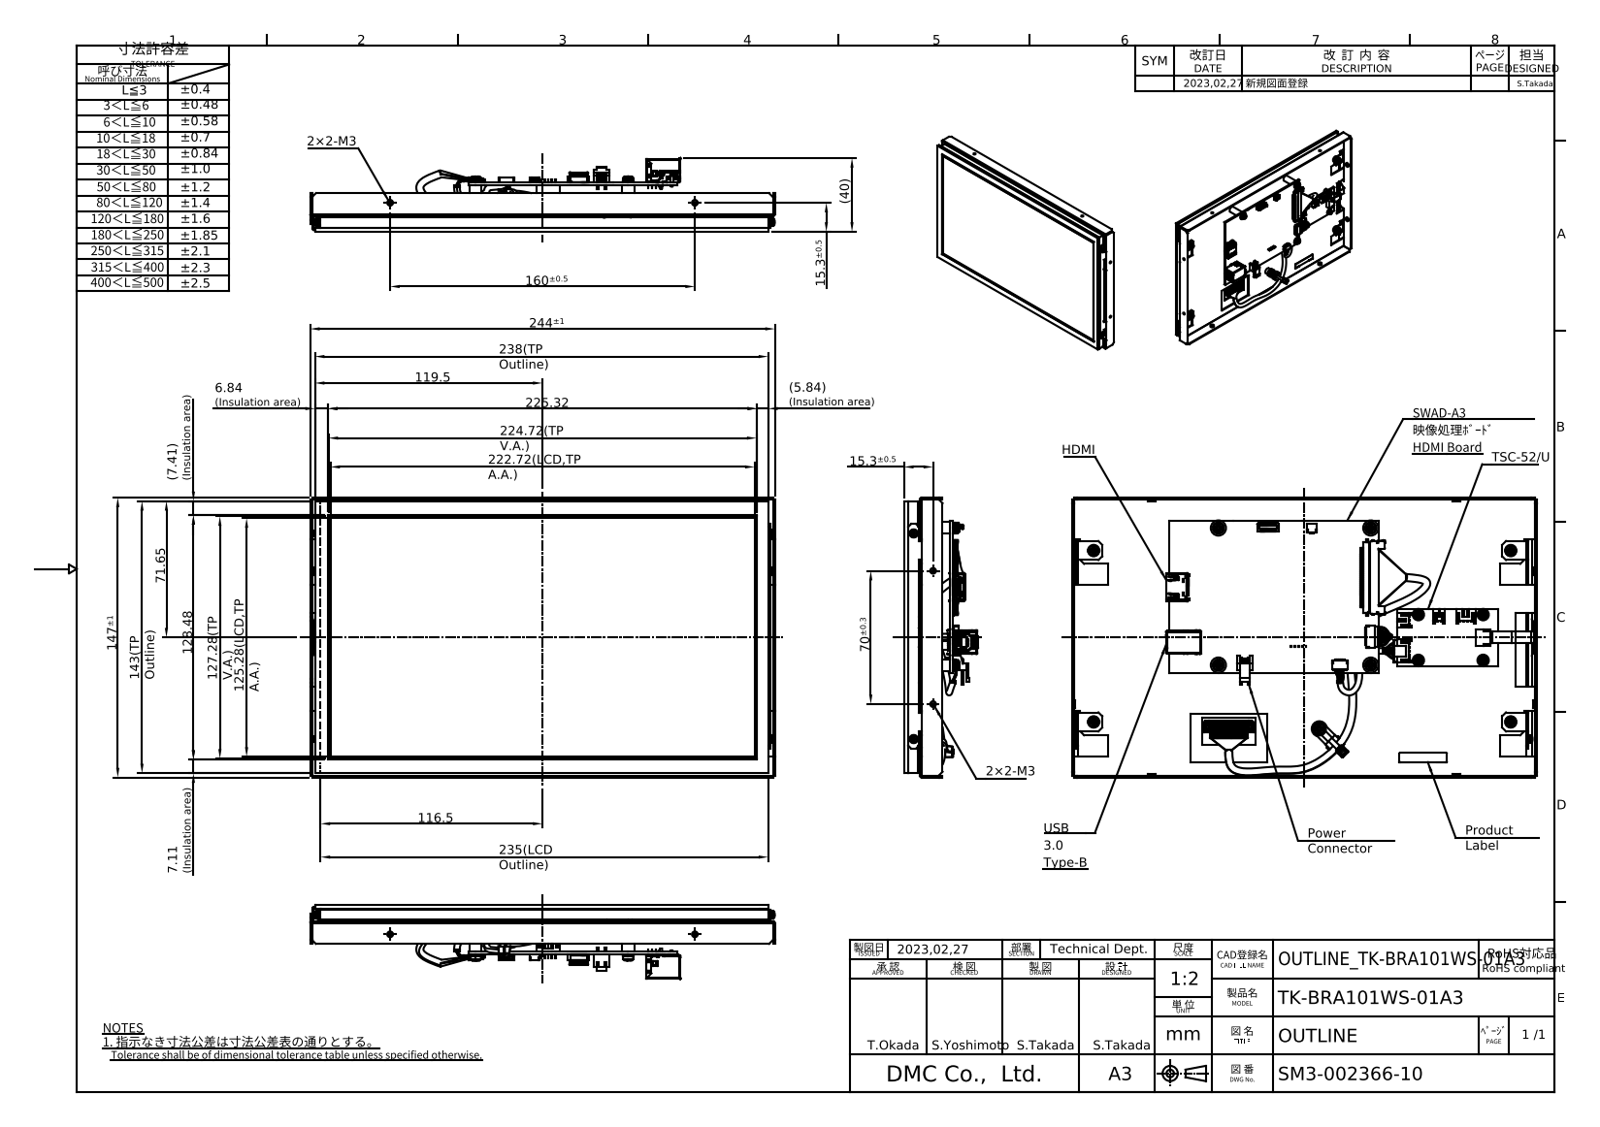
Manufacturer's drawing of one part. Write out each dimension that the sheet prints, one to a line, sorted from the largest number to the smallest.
244±1
238(TP Outline)
235(LCD Outline)
225.32
224.72(TP V.A.)
222.72(LCD,TP A.A.)
160±0.5
147±1
143(TP Outline)
128.48
127.28(TP V.A.)
125.28(LCD,TP A.A.)
119.5
116.5
71.65
70±0.3
(40)
15.3±0.5
15.3±0.5
(7.41) (Insulation area)
7.11 (Insulation area)
6.84 (Insulation area)
(5.84) (Insulation area)
